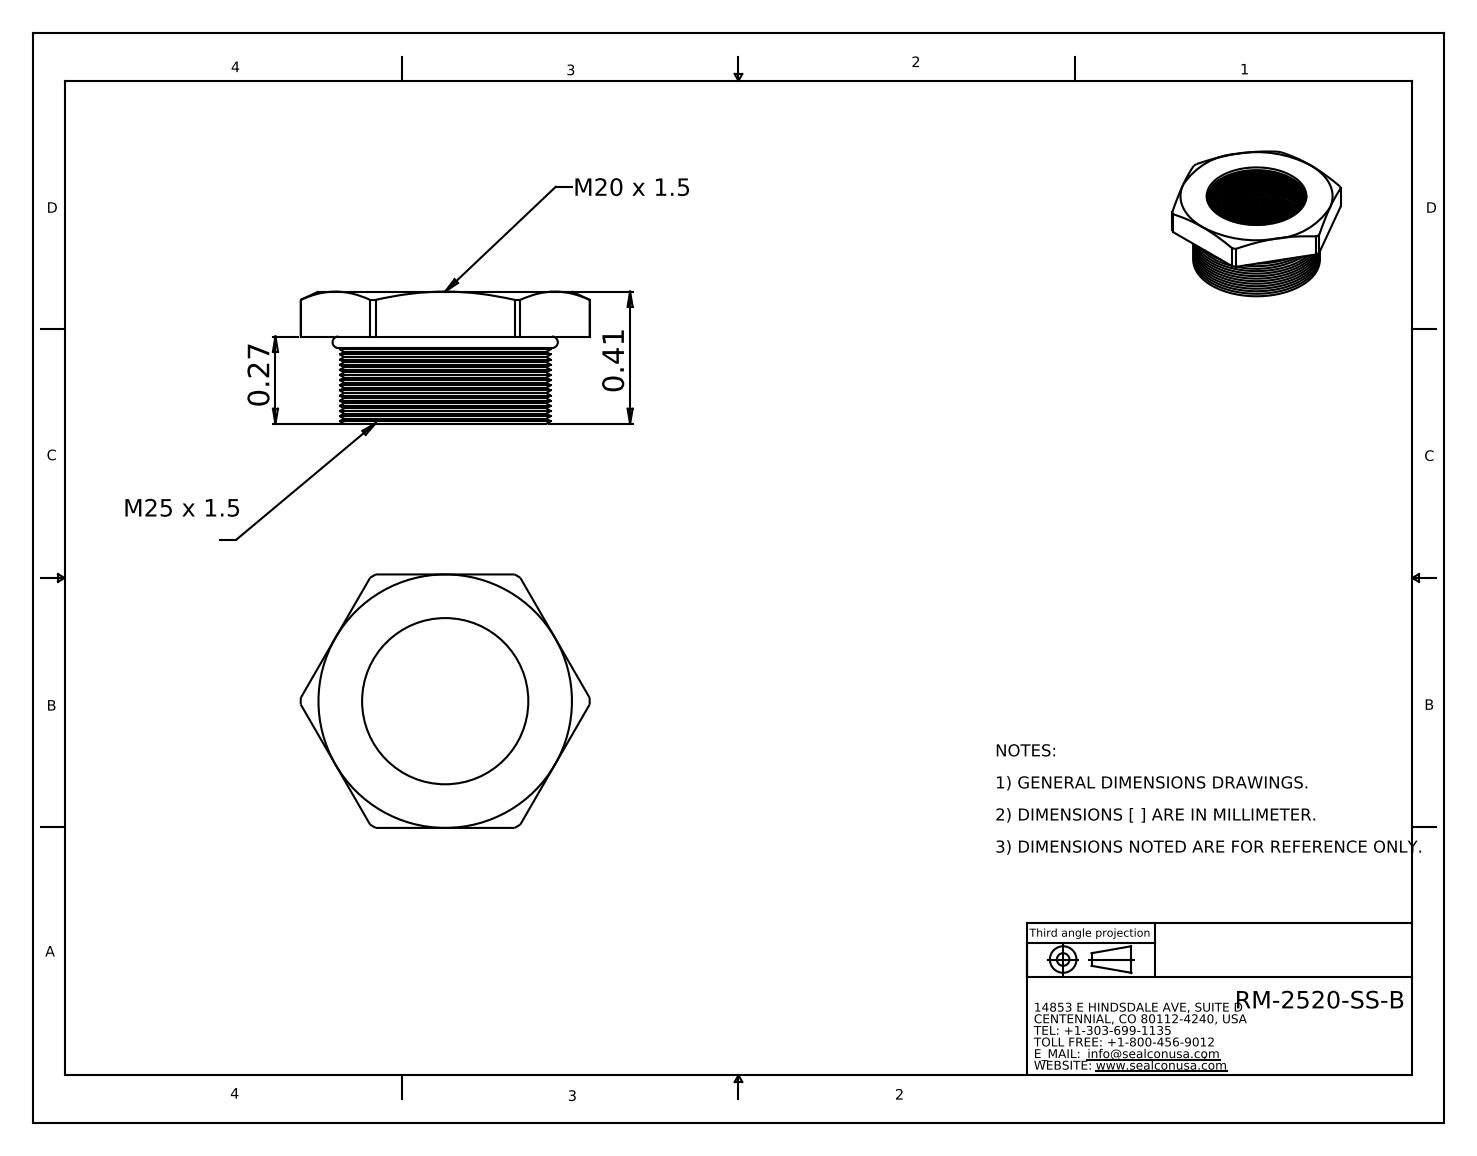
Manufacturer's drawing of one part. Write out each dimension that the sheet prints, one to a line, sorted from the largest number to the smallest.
0.41
0.27
